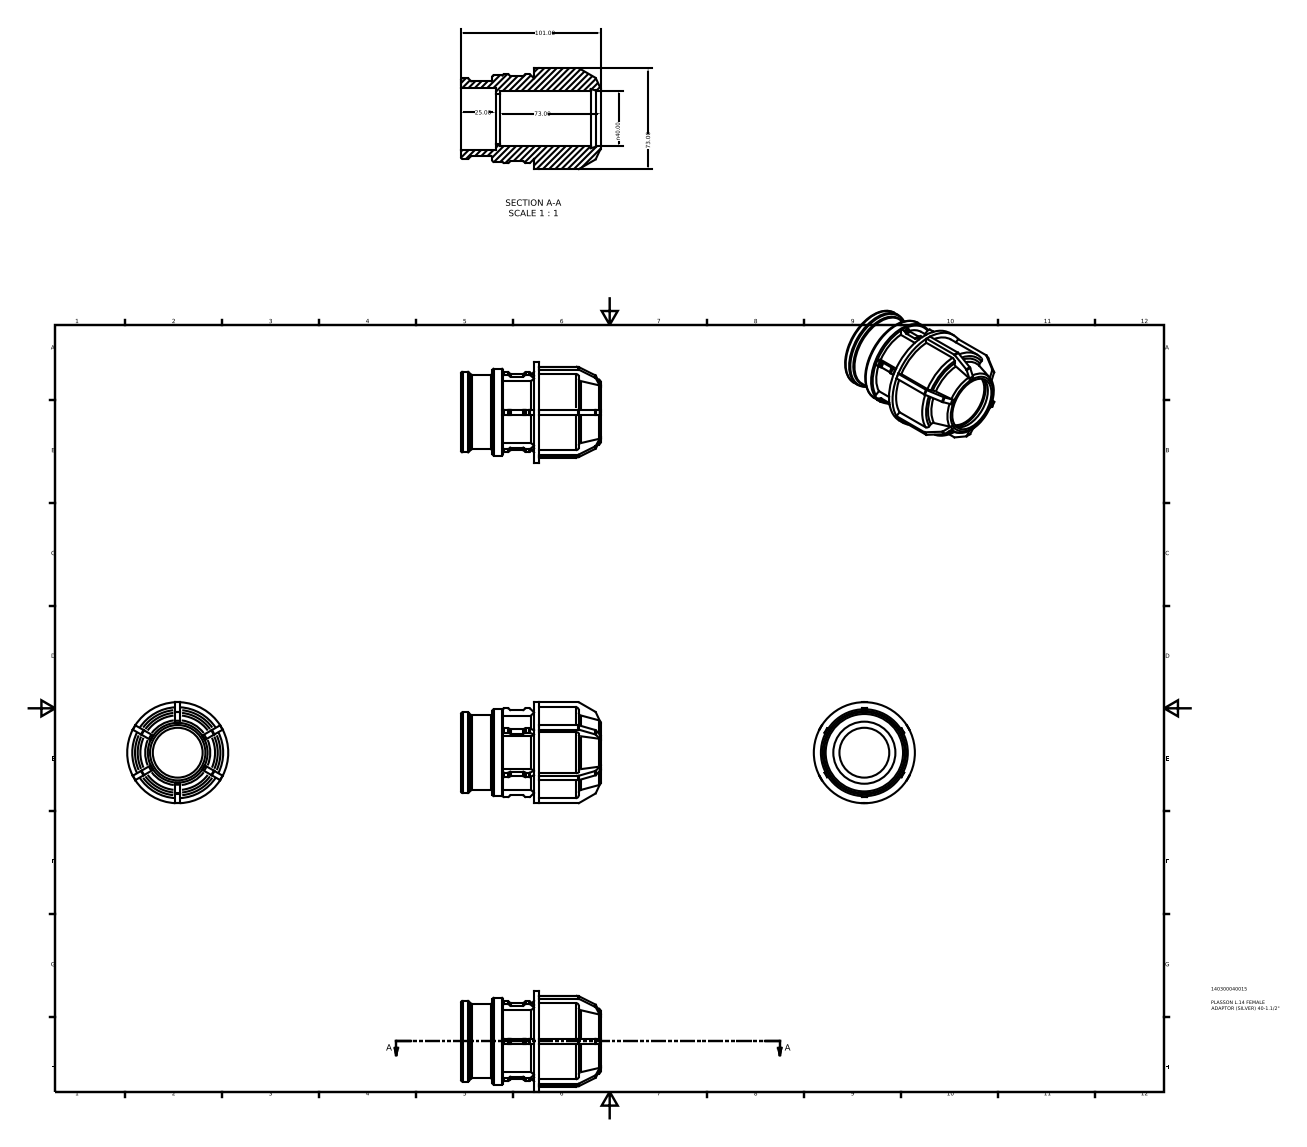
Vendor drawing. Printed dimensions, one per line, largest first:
101.00
73.00
73.00
n40.00
25.00
